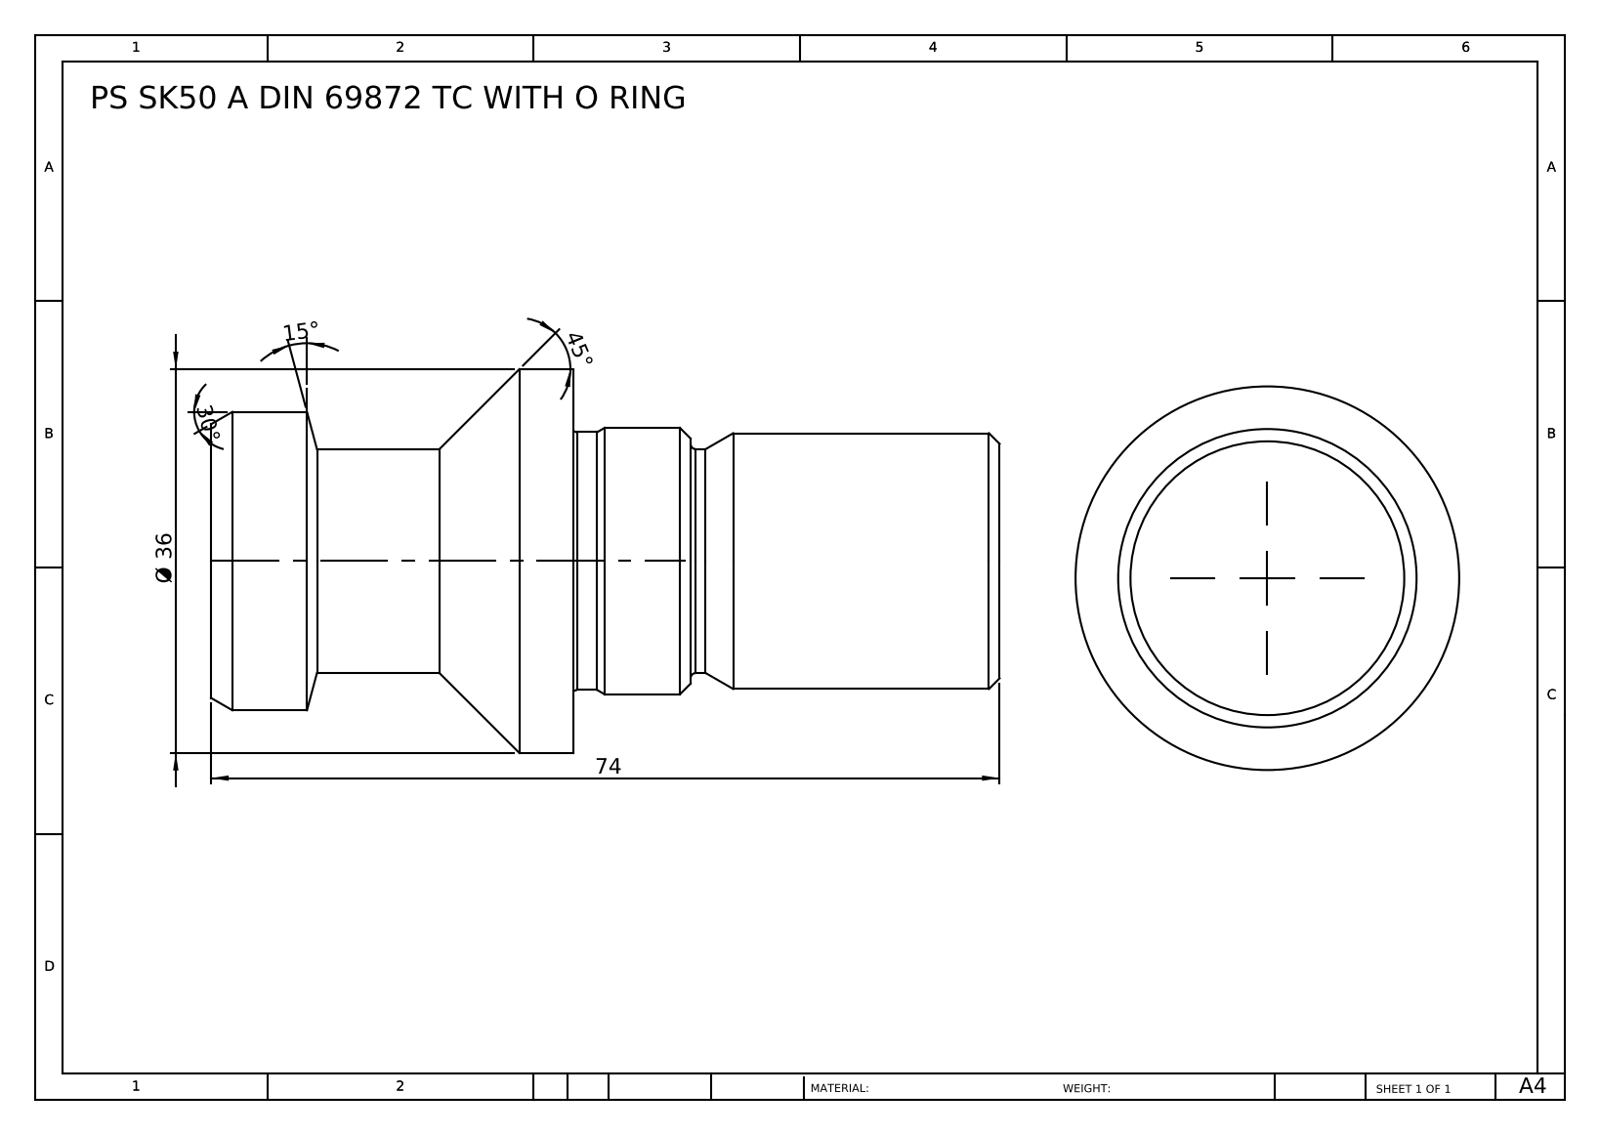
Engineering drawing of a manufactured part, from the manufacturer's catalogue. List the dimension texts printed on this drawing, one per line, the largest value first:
74
45°
Ø 36
30°
15°
